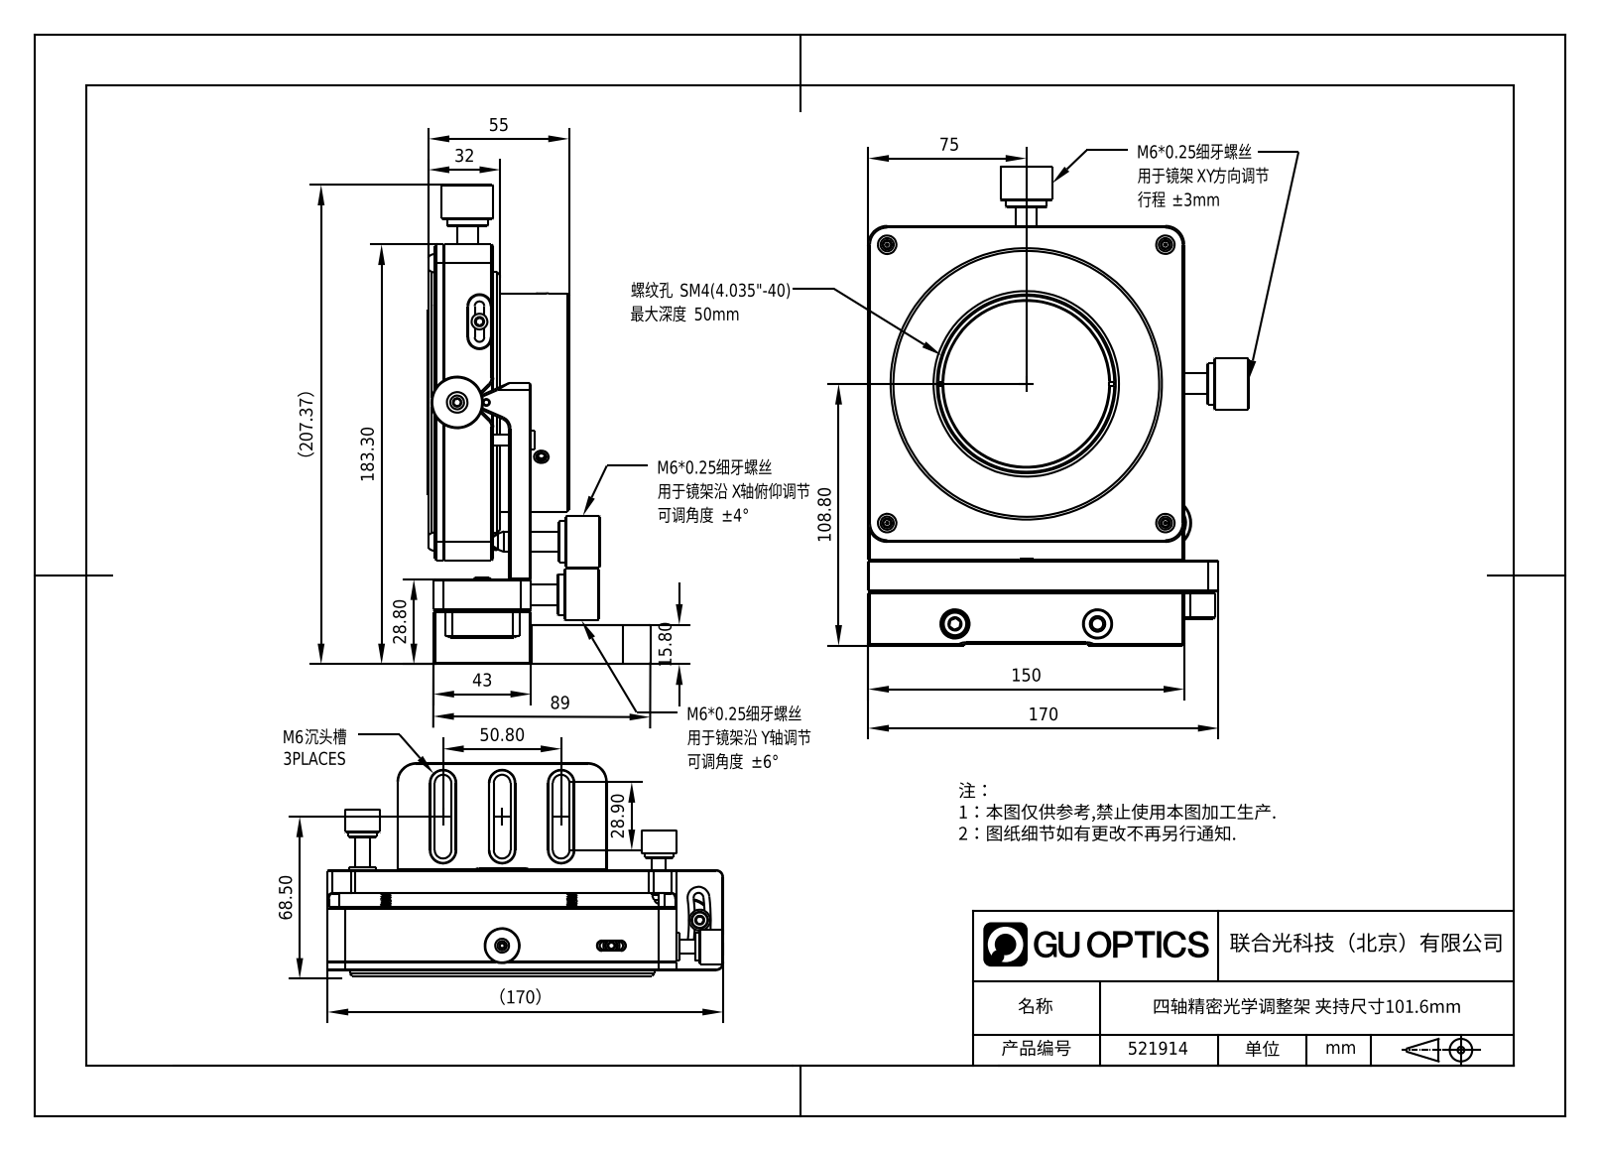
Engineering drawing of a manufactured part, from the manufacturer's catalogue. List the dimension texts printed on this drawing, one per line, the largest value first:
（207.37）
183.30
170
（170）
150
108.80
89
75
68.50
55
50.80
43
32
28.90
28.80
15.80
